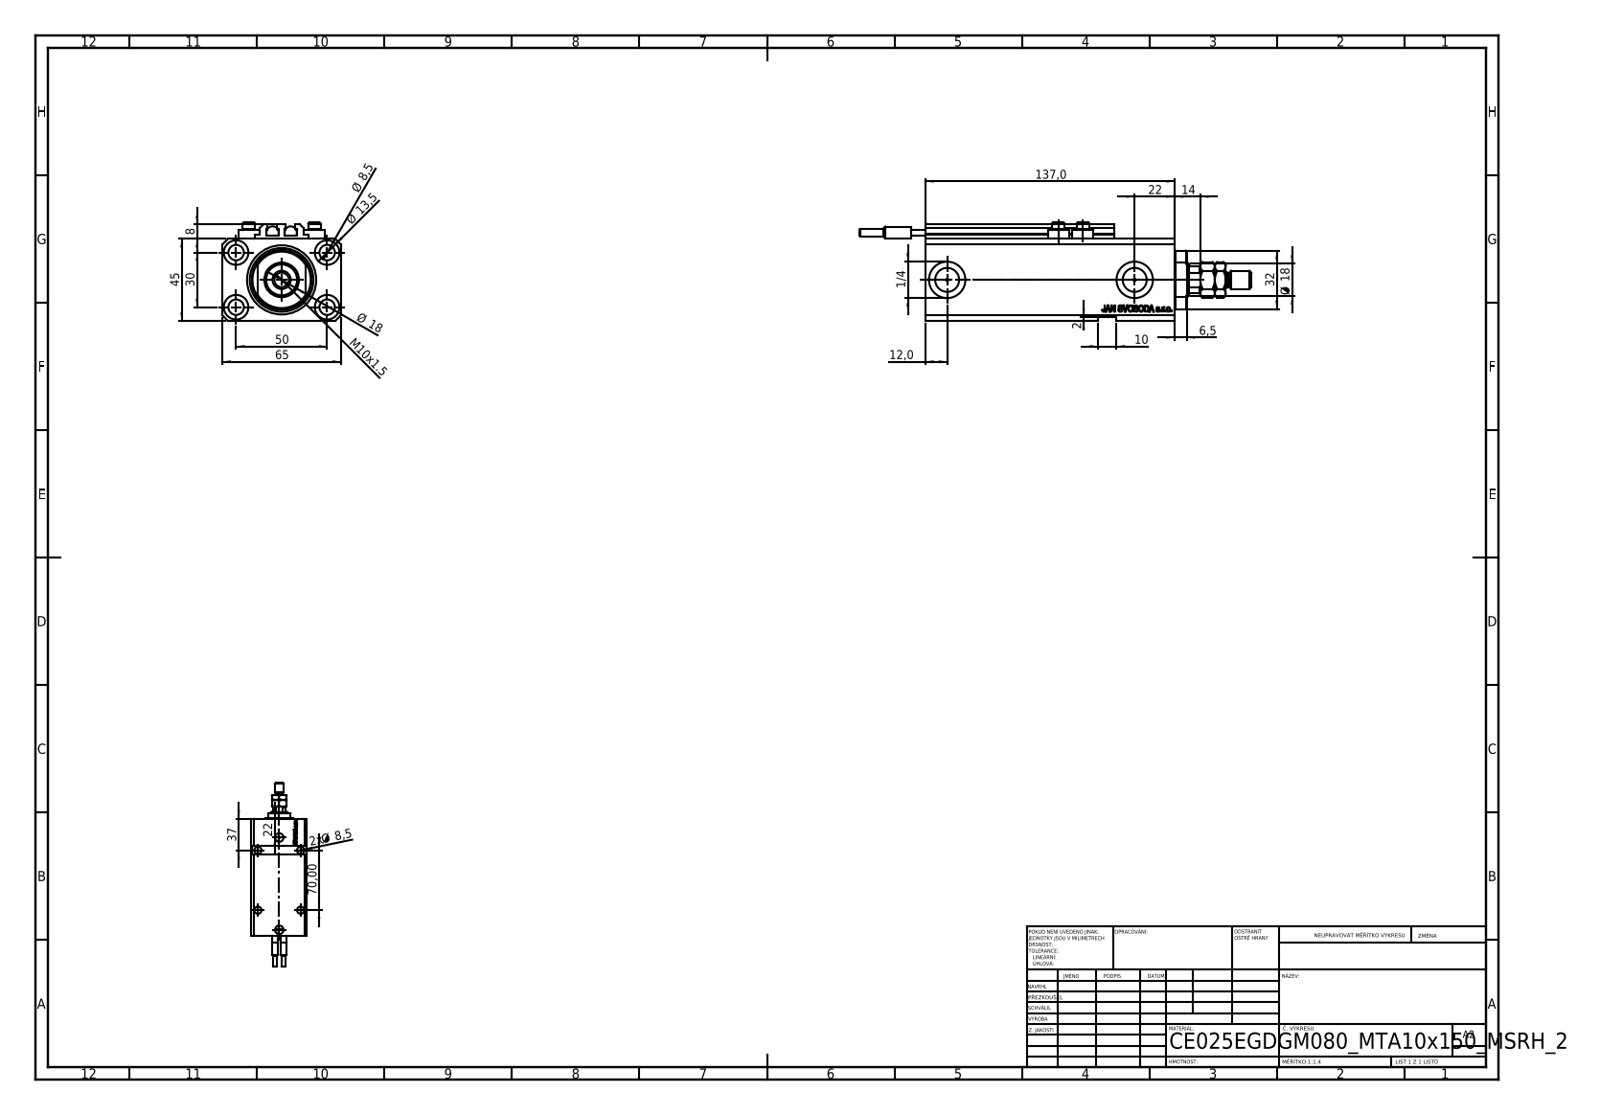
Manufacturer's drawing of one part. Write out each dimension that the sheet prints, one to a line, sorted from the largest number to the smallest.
137,0
70,00
65
50
45
37
32
30
22
22
Ø 18
Ø 18
14
Ø 13,5
12,0
M10x1.5
10
Ø 8,5
2x Ø 8,5
8
6,5
2
1/4
